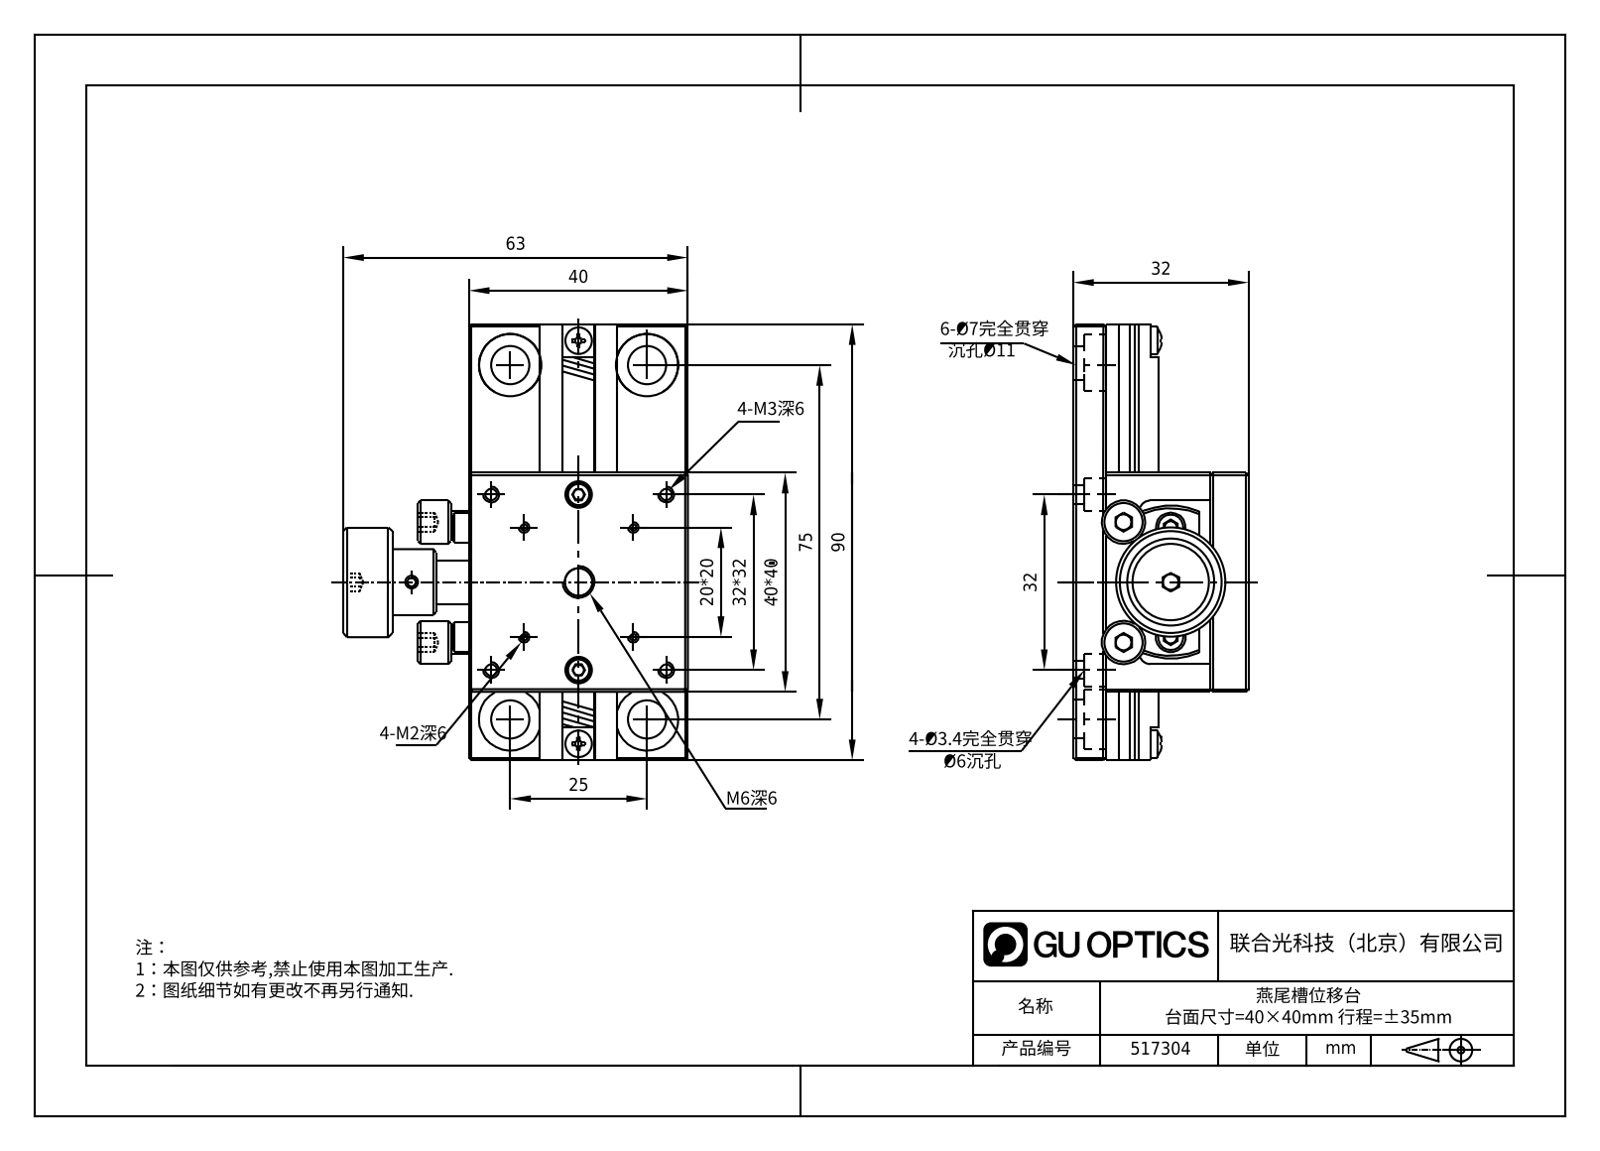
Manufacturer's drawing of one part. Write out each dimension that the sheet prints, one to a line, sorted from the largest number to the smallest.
90
75
63
40*40
40
32*32
32
32
25
20*20
